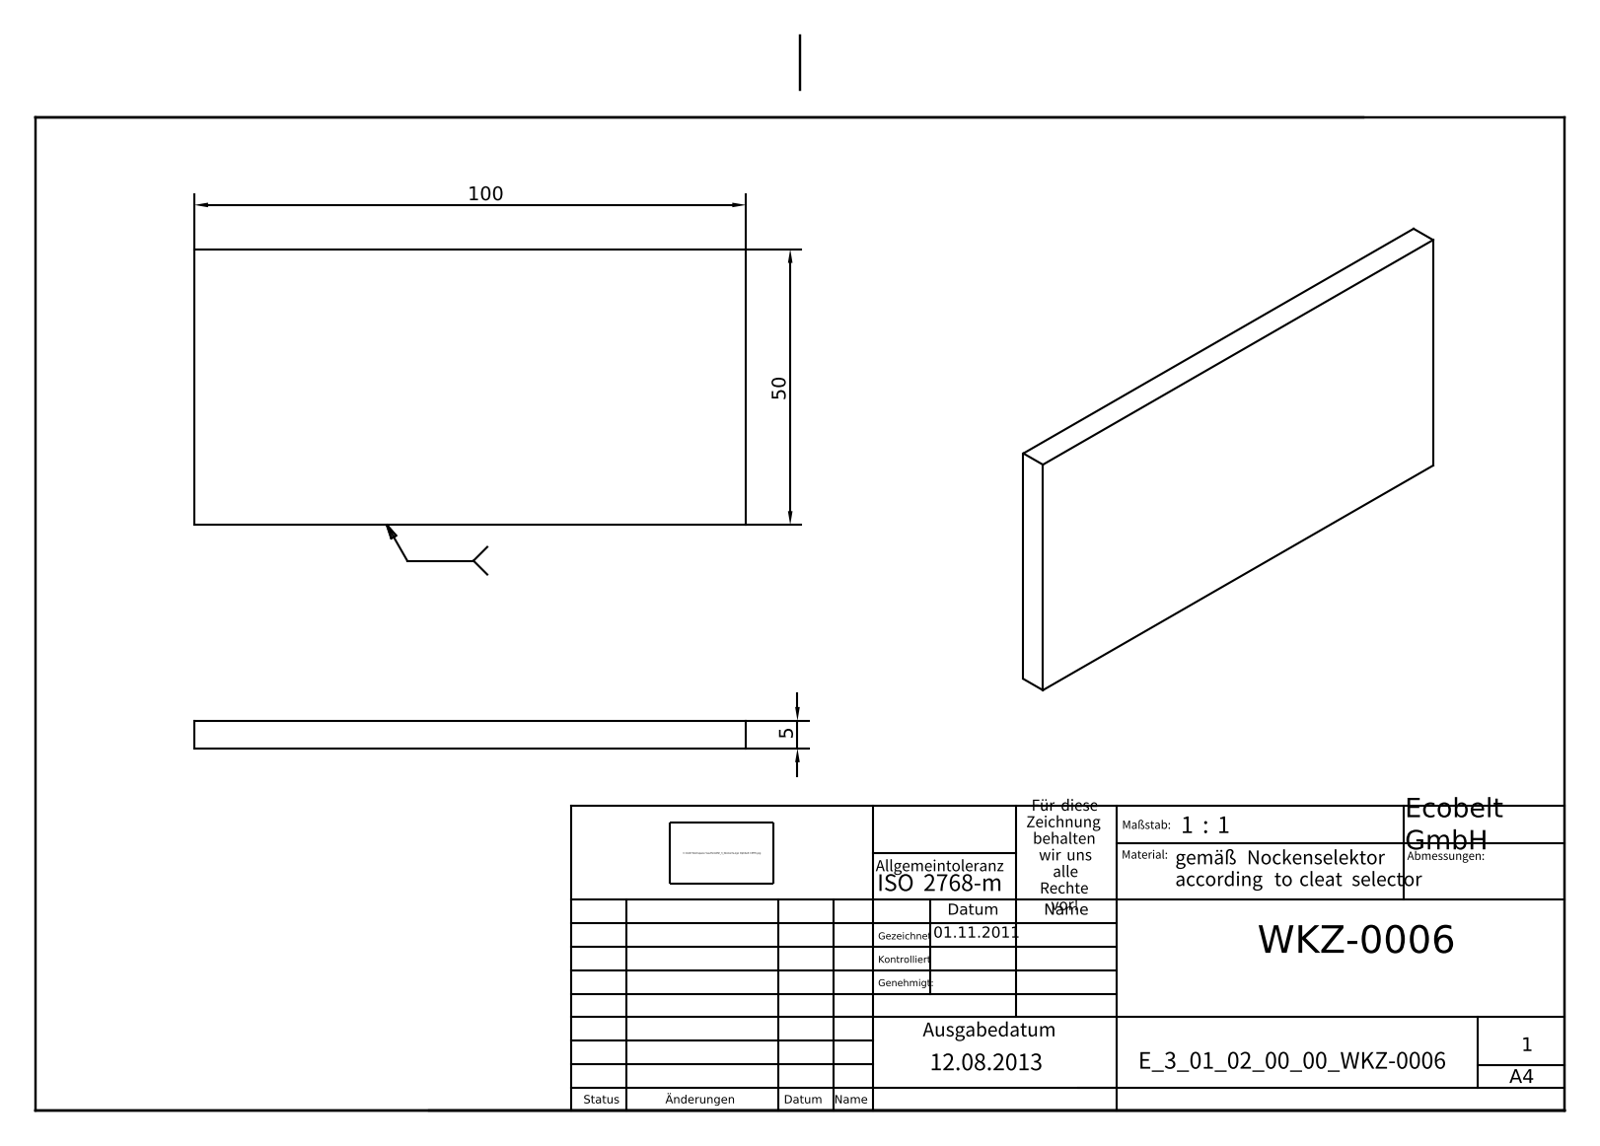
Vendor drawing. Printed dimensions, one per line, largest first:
100
50
5
